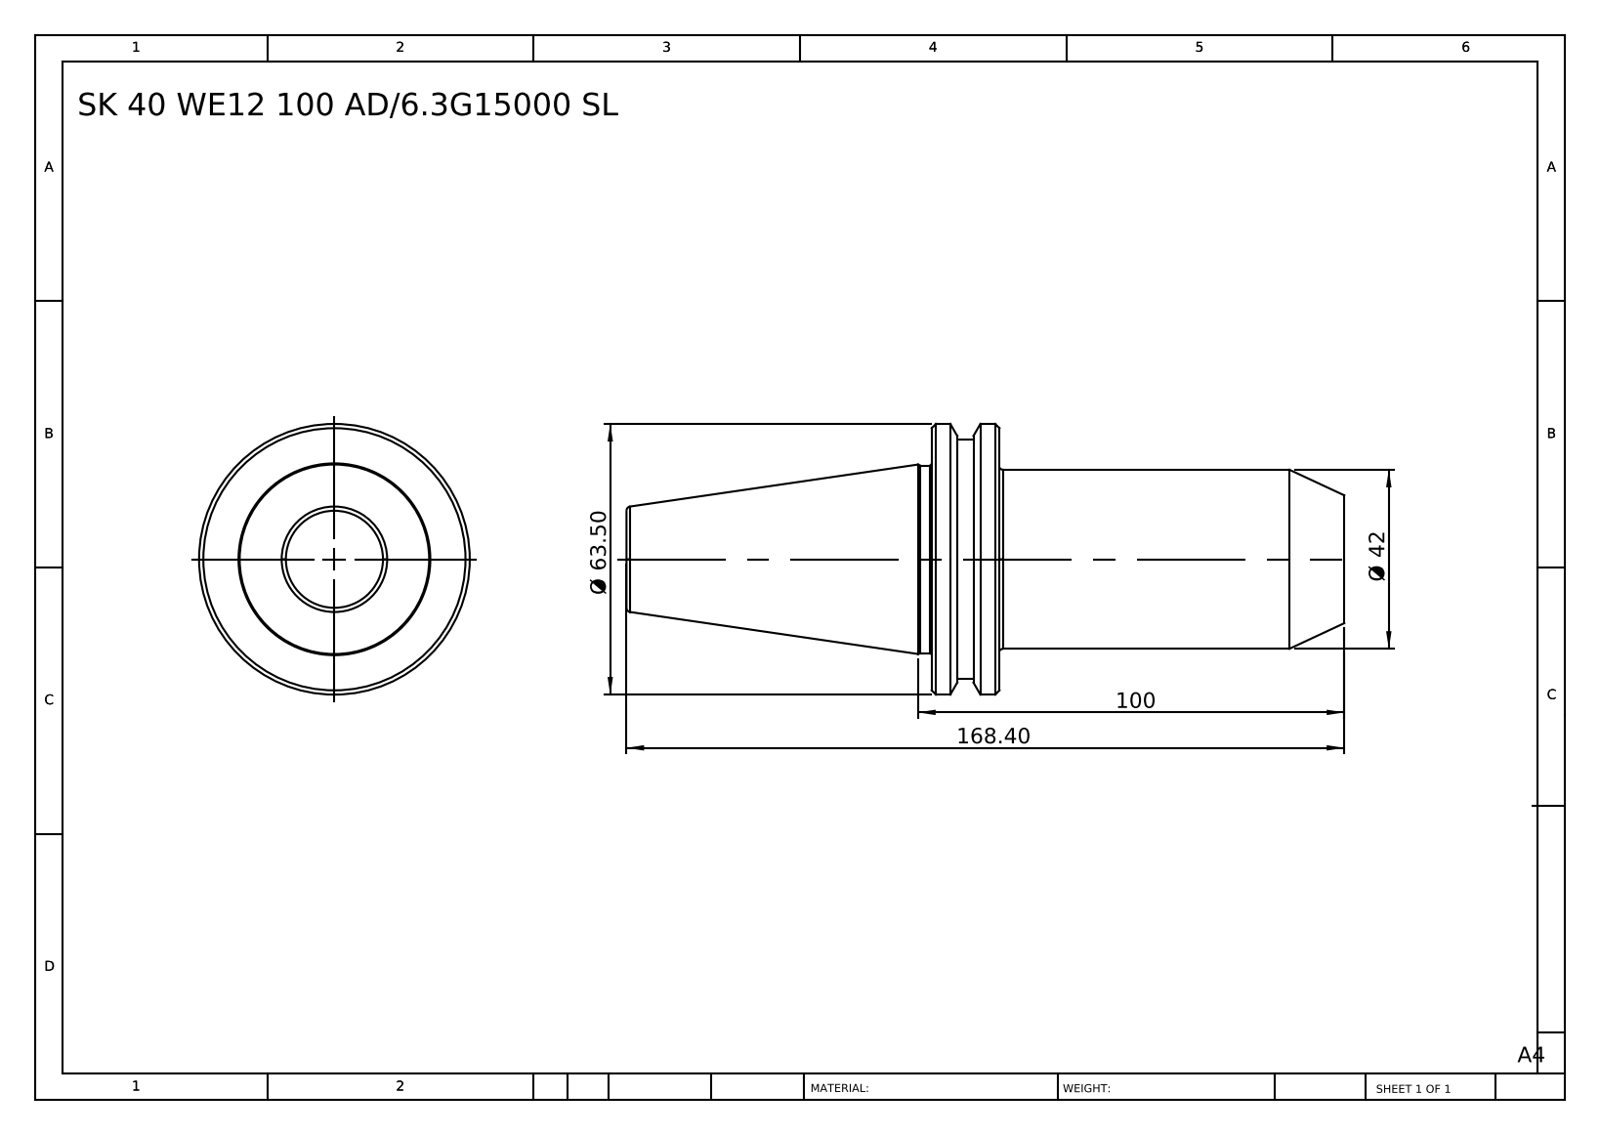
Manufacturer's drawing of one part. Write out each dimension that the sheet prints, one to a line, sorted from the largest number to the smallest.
168.40
100
Ø 63.50
Ø 42
